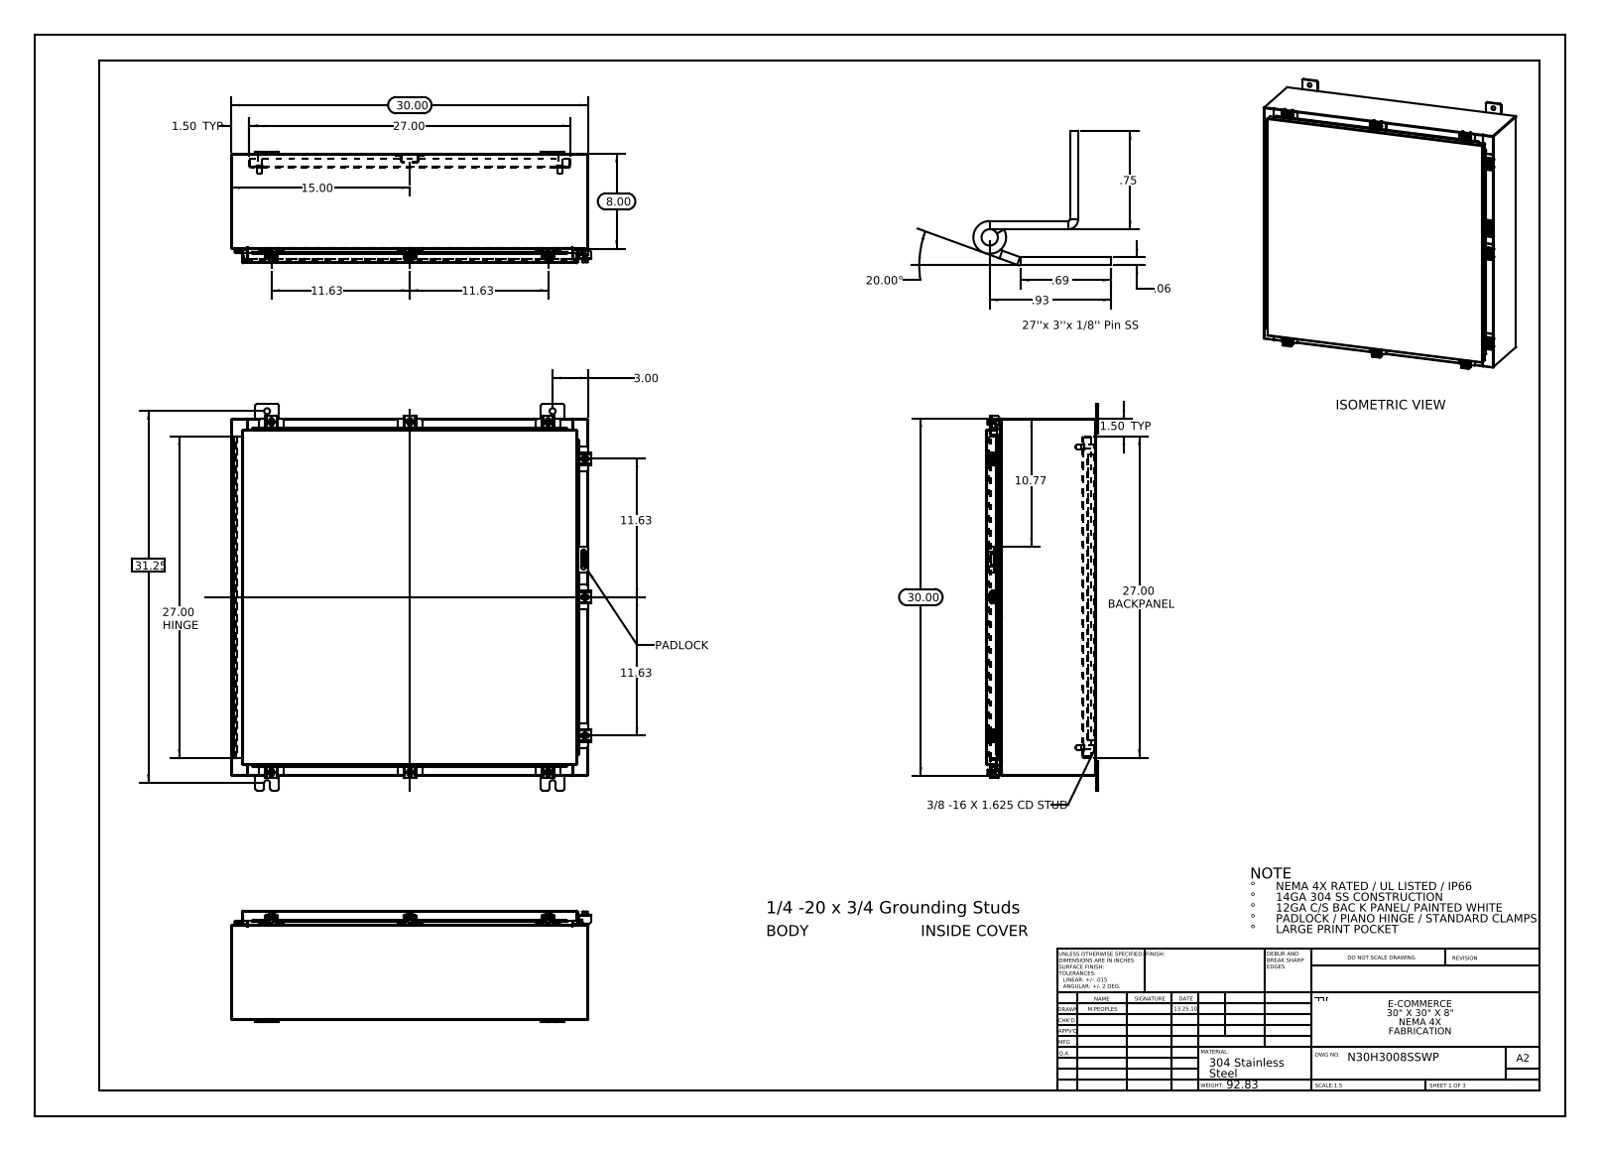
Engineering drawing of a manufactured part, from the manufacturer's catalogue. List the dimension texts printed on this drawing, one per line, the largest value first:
31.25
30.00
30.00
27.00 HINGE
27.00
27.00 BACKPANEL
20.00°
15.00
11.63
11.63
11.63
11.63
10.77
8.00
3.00
1.50 TYP
1.50 TYP
.93
.75
.69
.06
